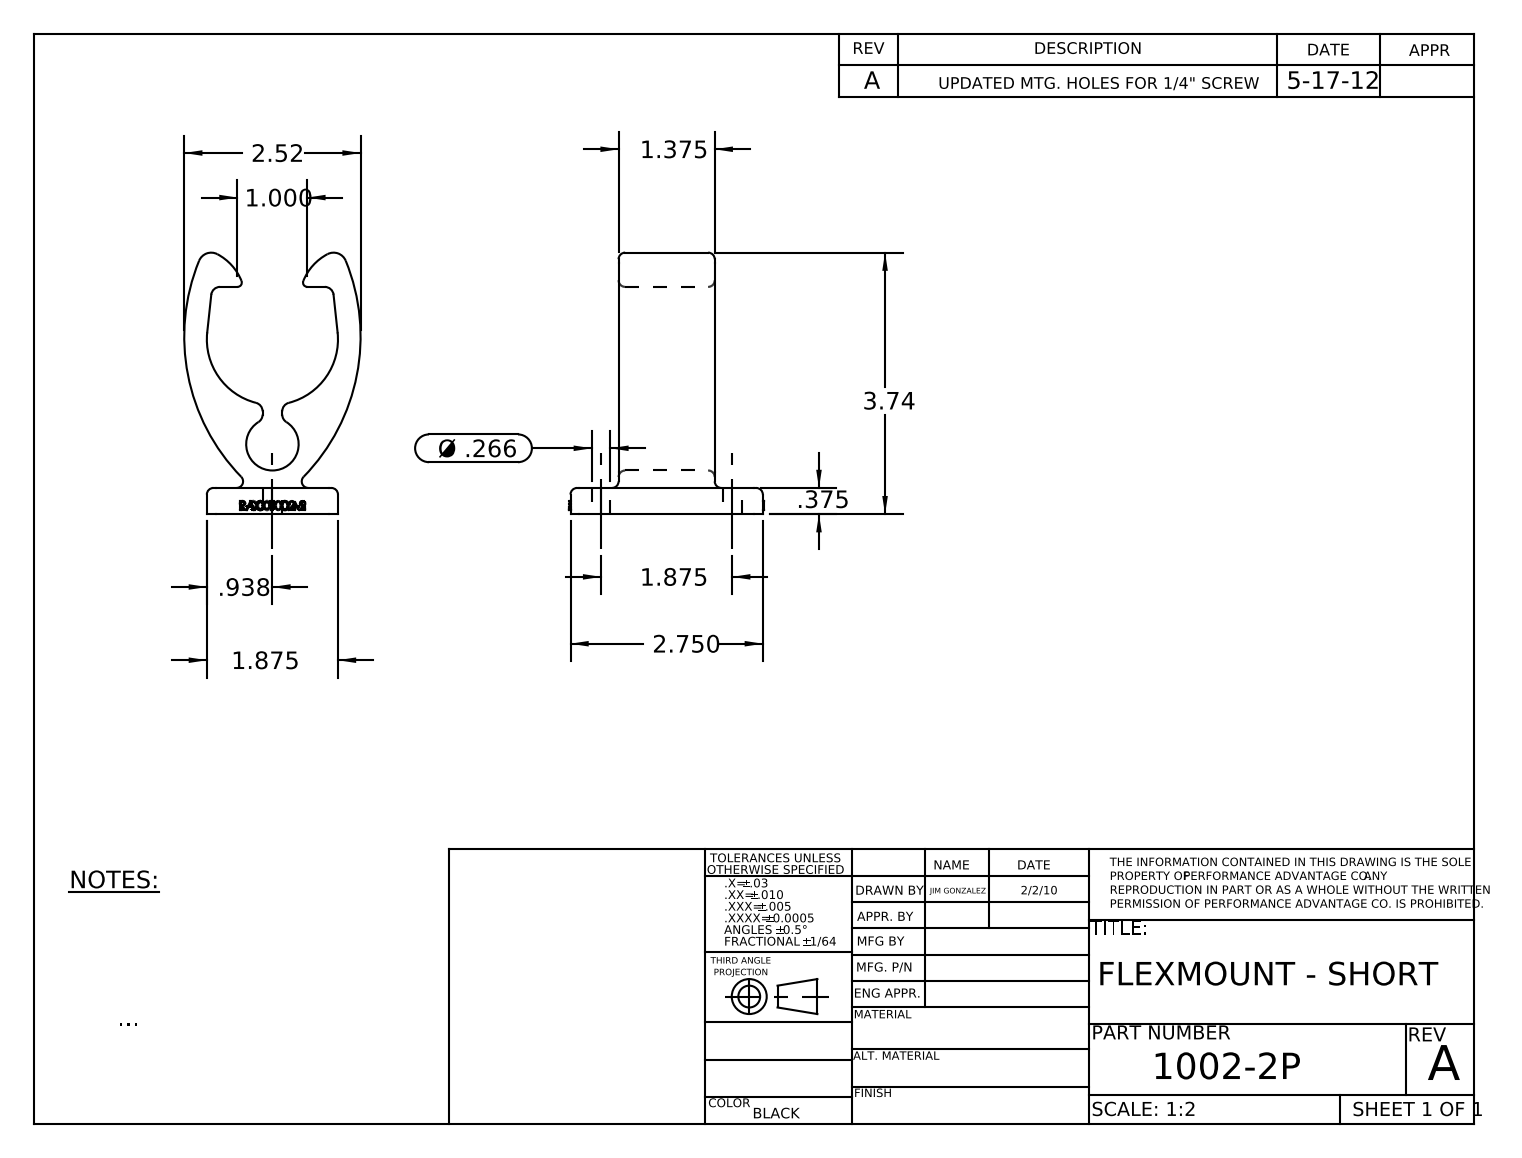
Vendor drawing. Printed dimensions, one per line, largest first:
3.74
2.750
2.52
1.875
1.875
1.375
1.000
.938
.375
Ø .266
